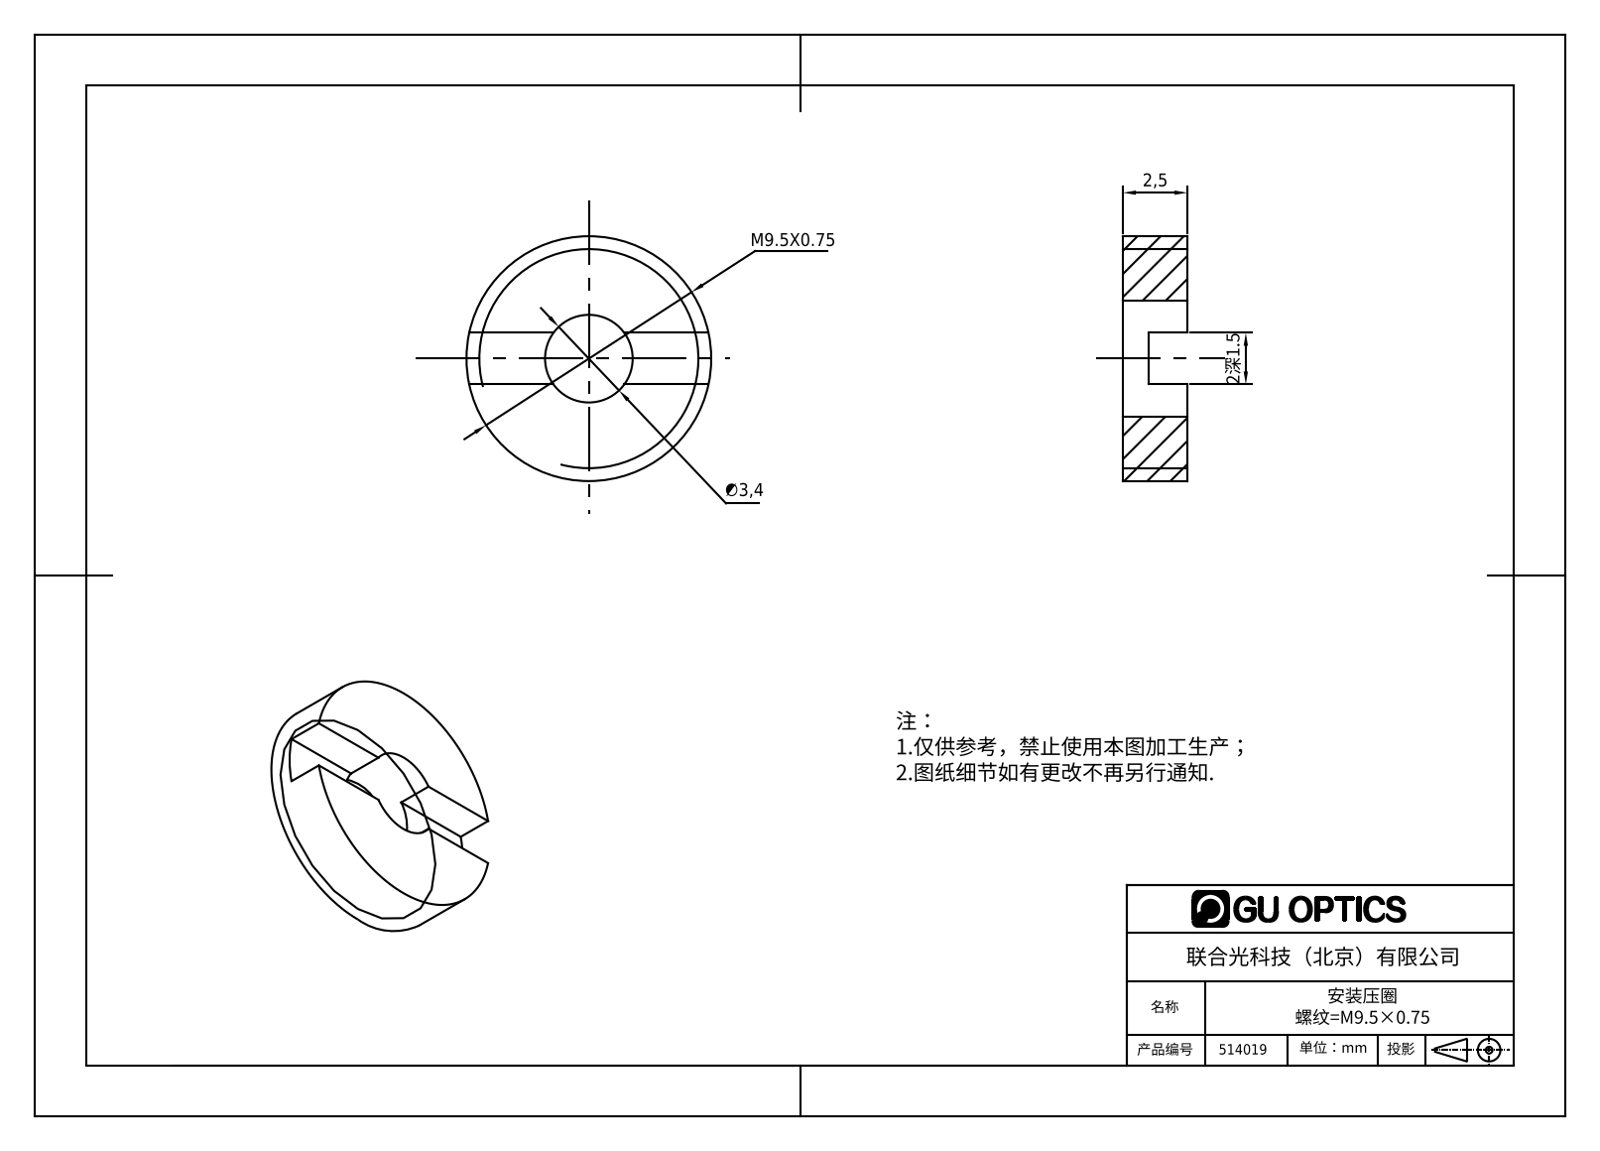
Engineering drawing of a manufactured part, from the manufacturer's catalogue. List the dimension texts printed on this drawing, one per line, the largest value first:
M9.5X0.75
∅3,4
2,5
2深1.5
